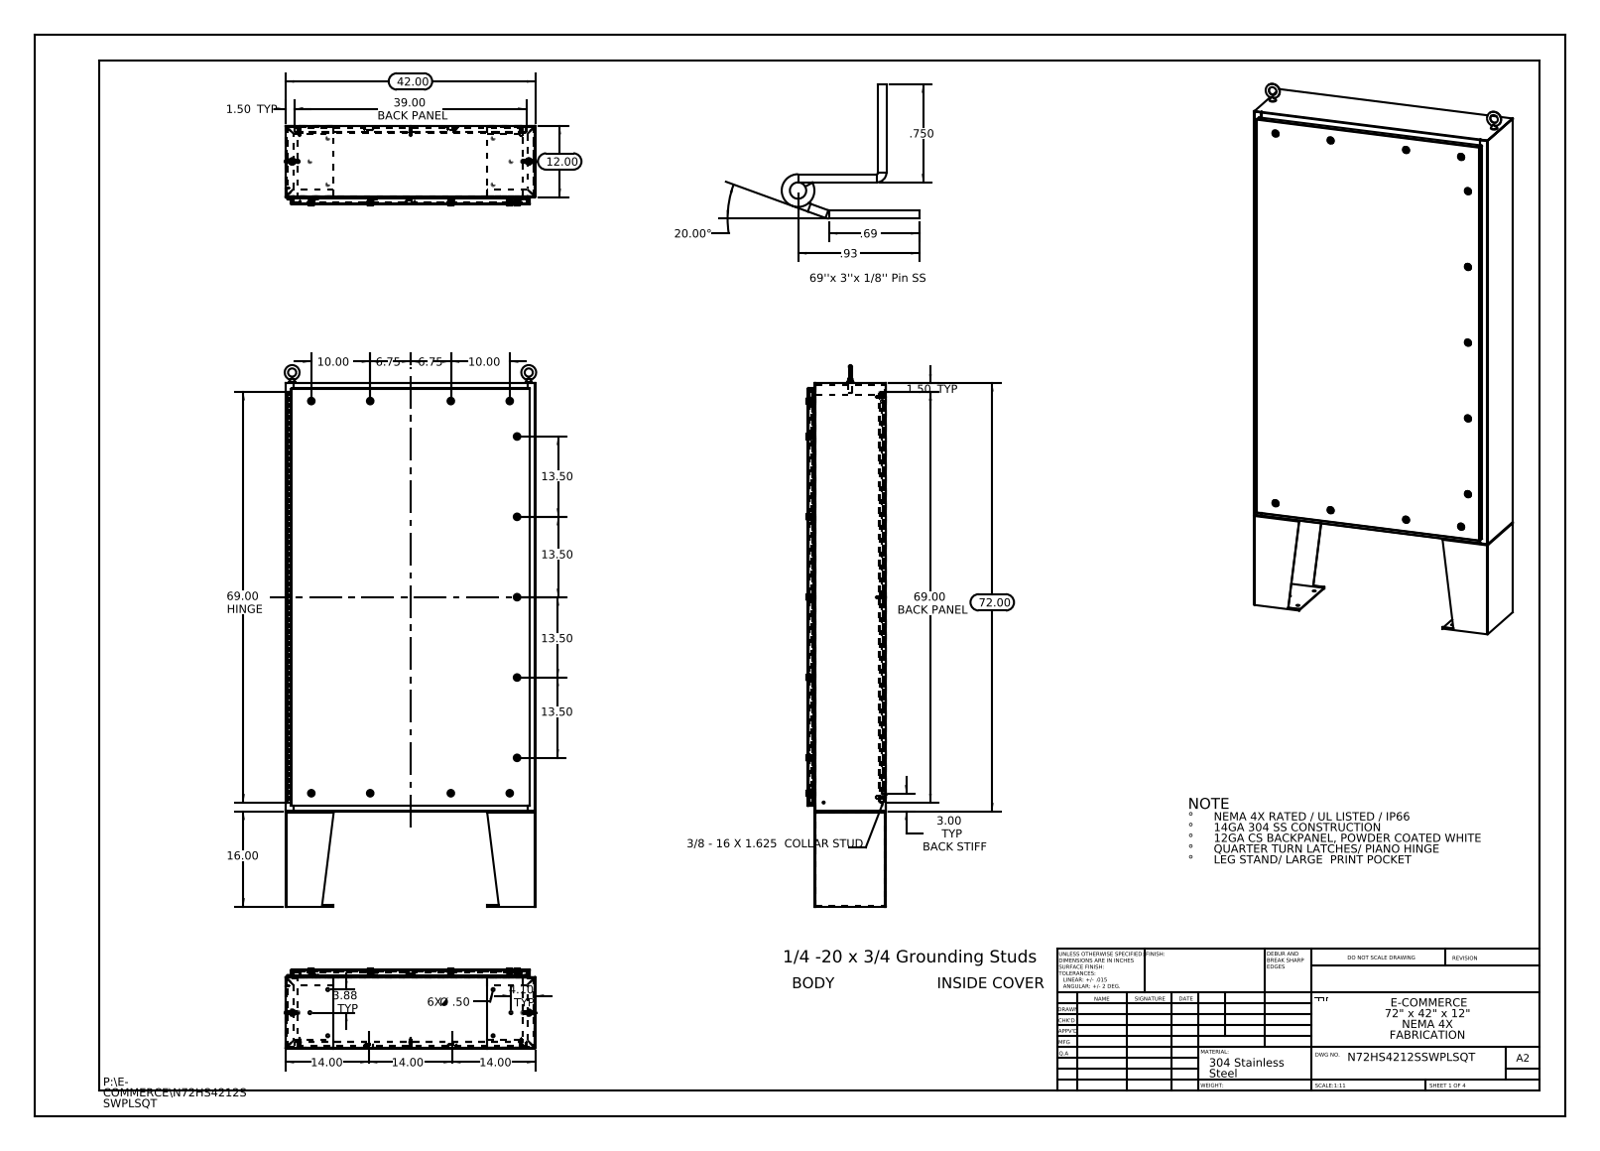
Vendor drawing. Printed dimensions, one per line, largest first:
72.00
69.00 HINGE
69.00 BACK PANEL
42.00
39.00 BACK PANEL
20.00°
16.00
14.00
14.00
14.00
13.50
13.50
13.50
13.50
12.00
10.00
10.00
6.75
6.75
4.10 TYP
3.88 TYP
3.00 TYP BACK STIFF
1.50 TYP
1.50 TYP
.93
.750
.69
6X Ø .50
